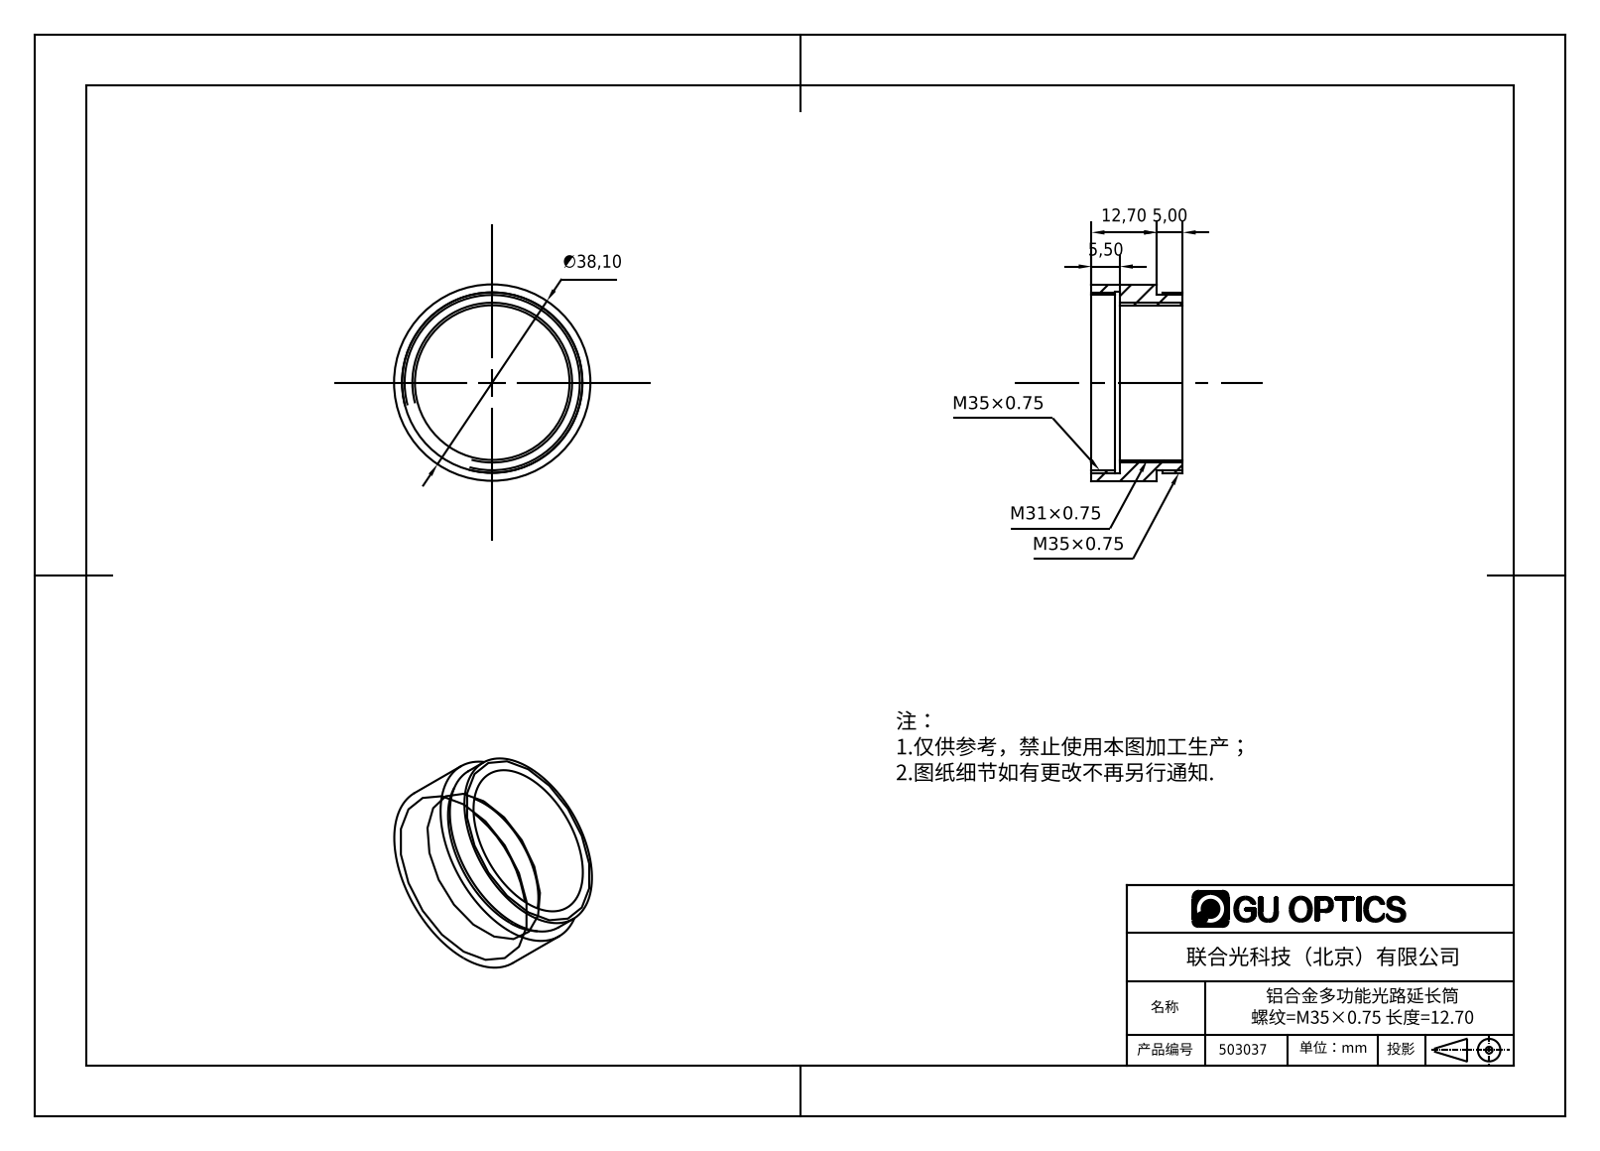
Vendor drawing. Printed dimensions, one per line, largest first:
∅38,10
12,70
5,50
5,00
